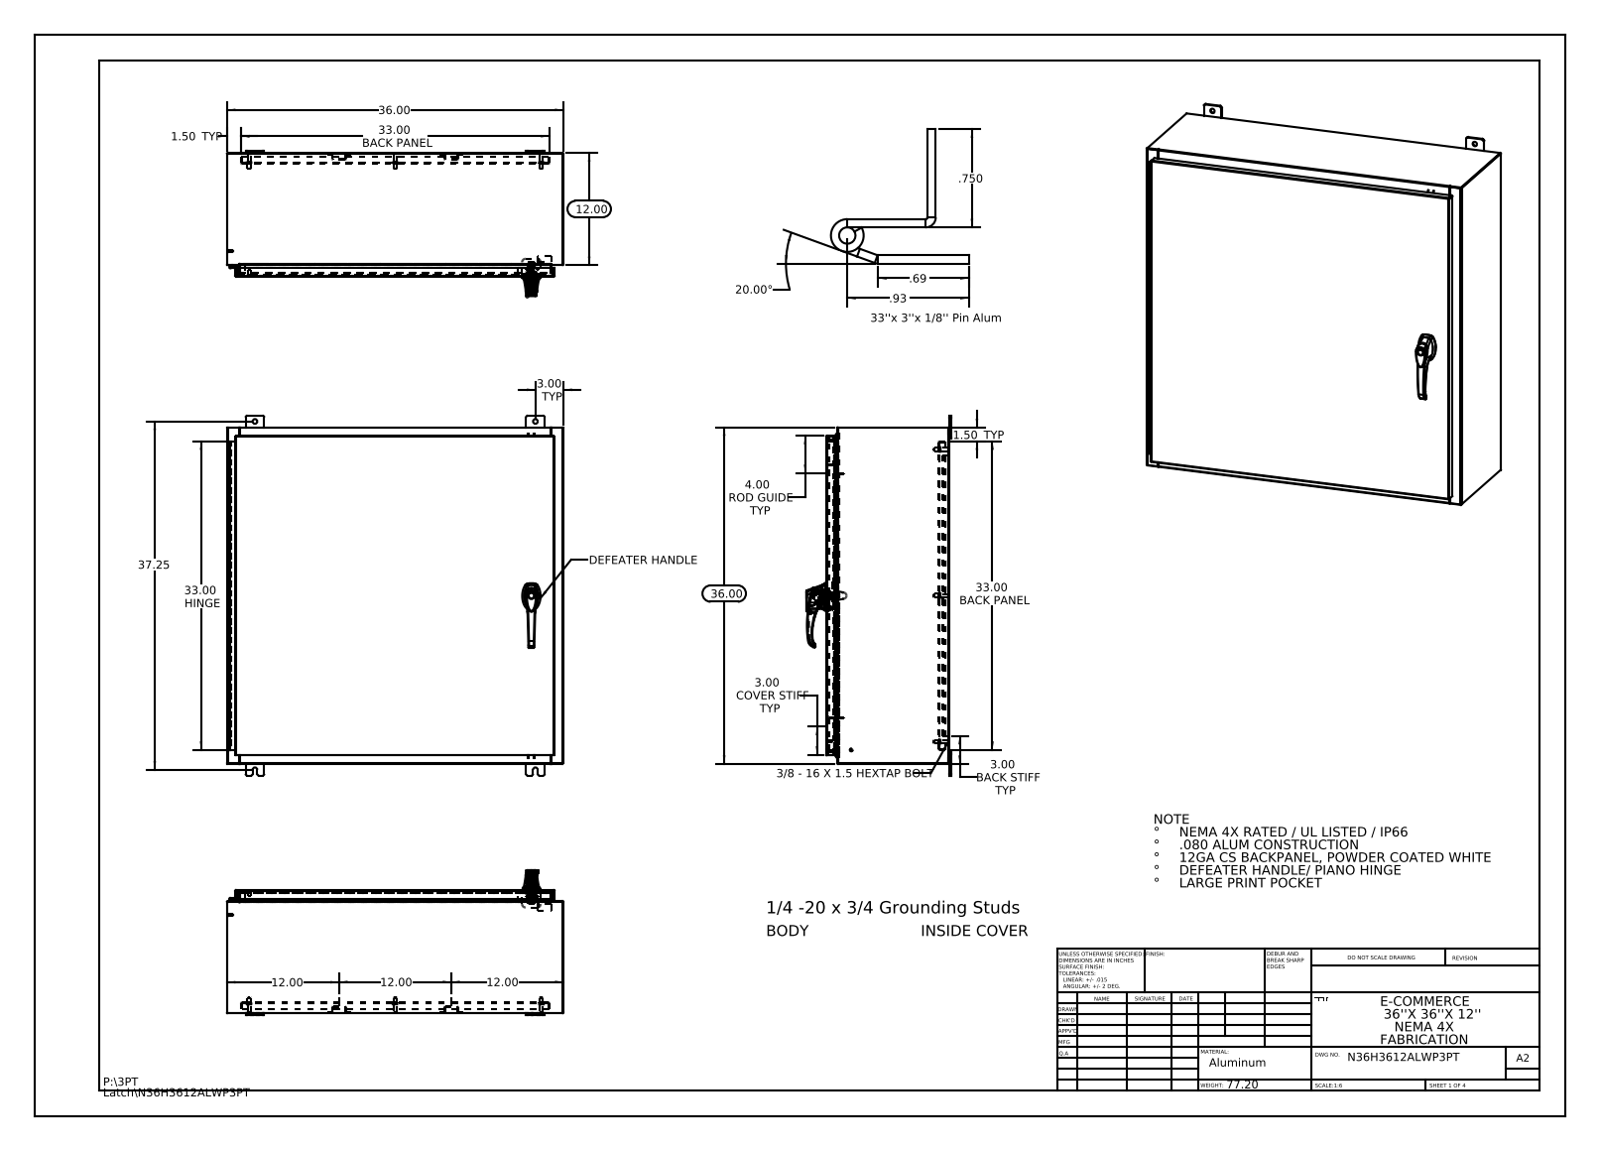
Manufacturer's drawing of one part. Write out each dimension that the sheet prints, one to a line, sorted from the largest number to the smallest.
37.25
36.00
36.00
33.00 HINGE
33.00 BACK PANEL
33.00 BACK PANEL
20.00°
12.00
12.00
12.00
12.00
4.00 ROD GUIDE TYP
3.00 TYP
3.00 BACK STIFF TYP
3.00 COVER STIFF TYP
1.50 TYP
1.50 TYP
.93
.750
.69
